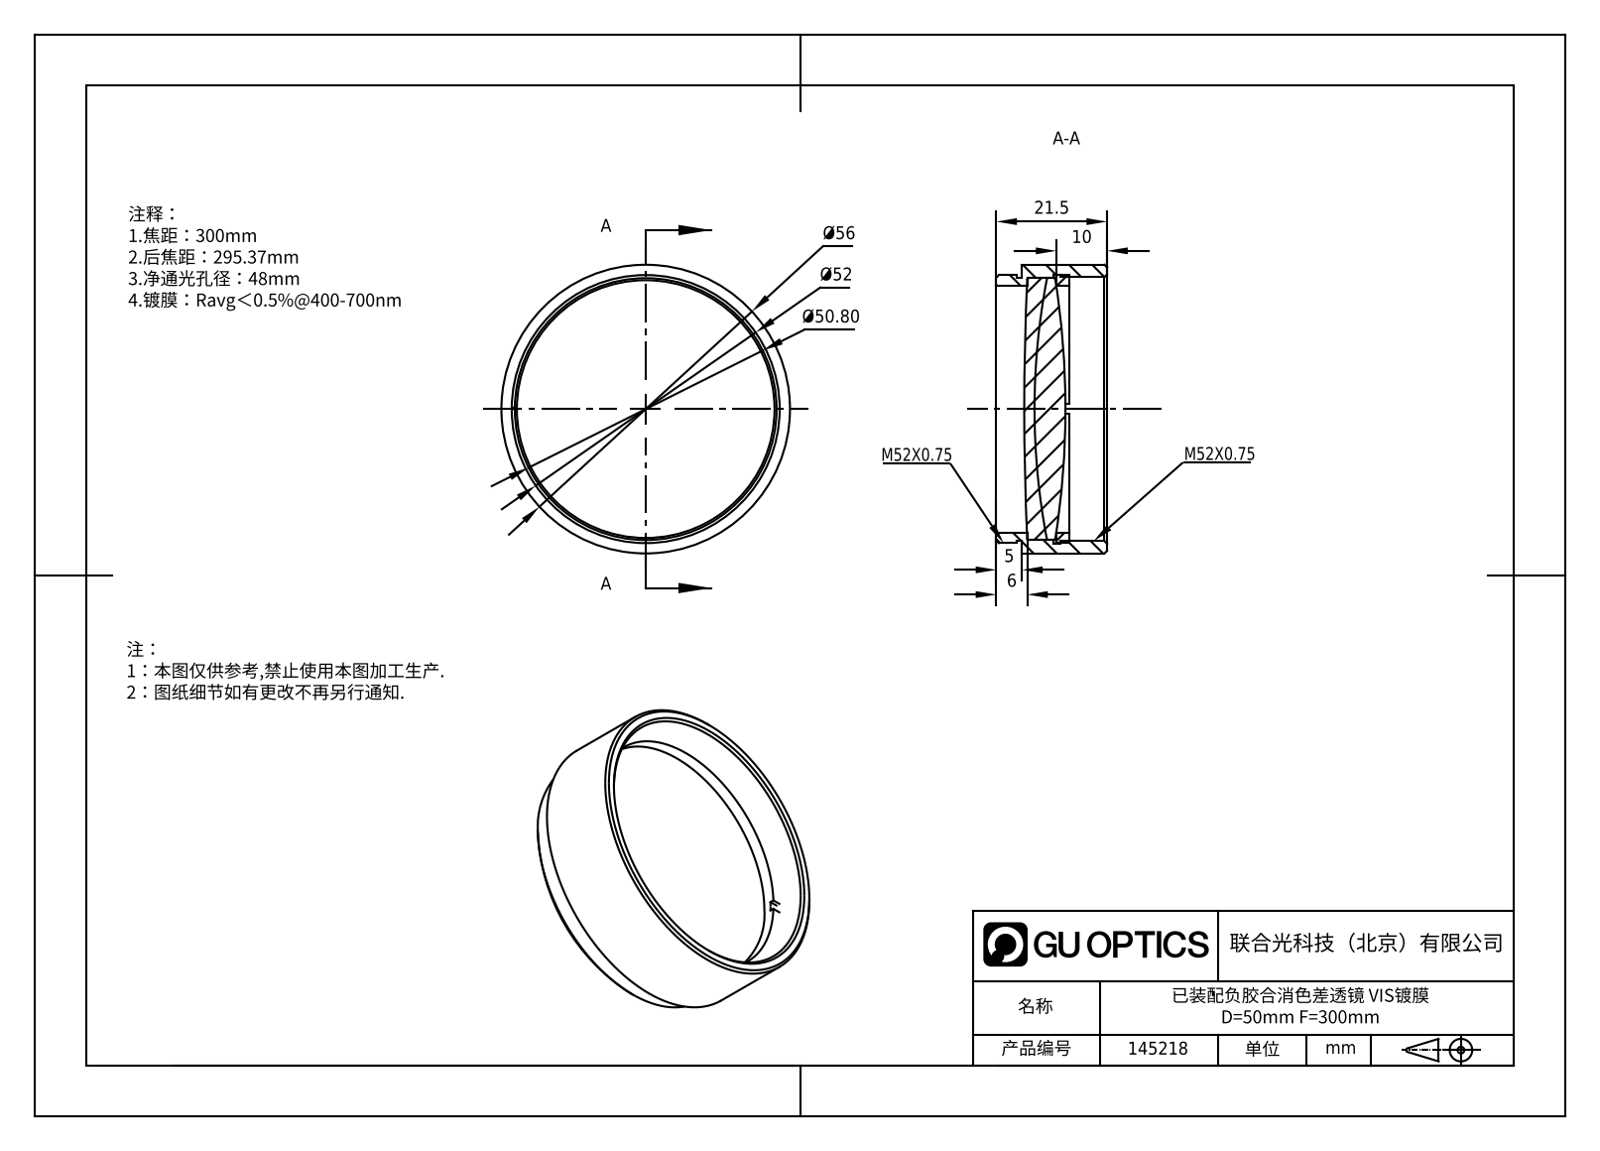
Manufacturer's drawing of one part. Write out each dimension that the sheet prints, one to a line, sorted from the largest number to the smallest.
Ø56
Ø52
Ø50.80
21.5
10
6
5
